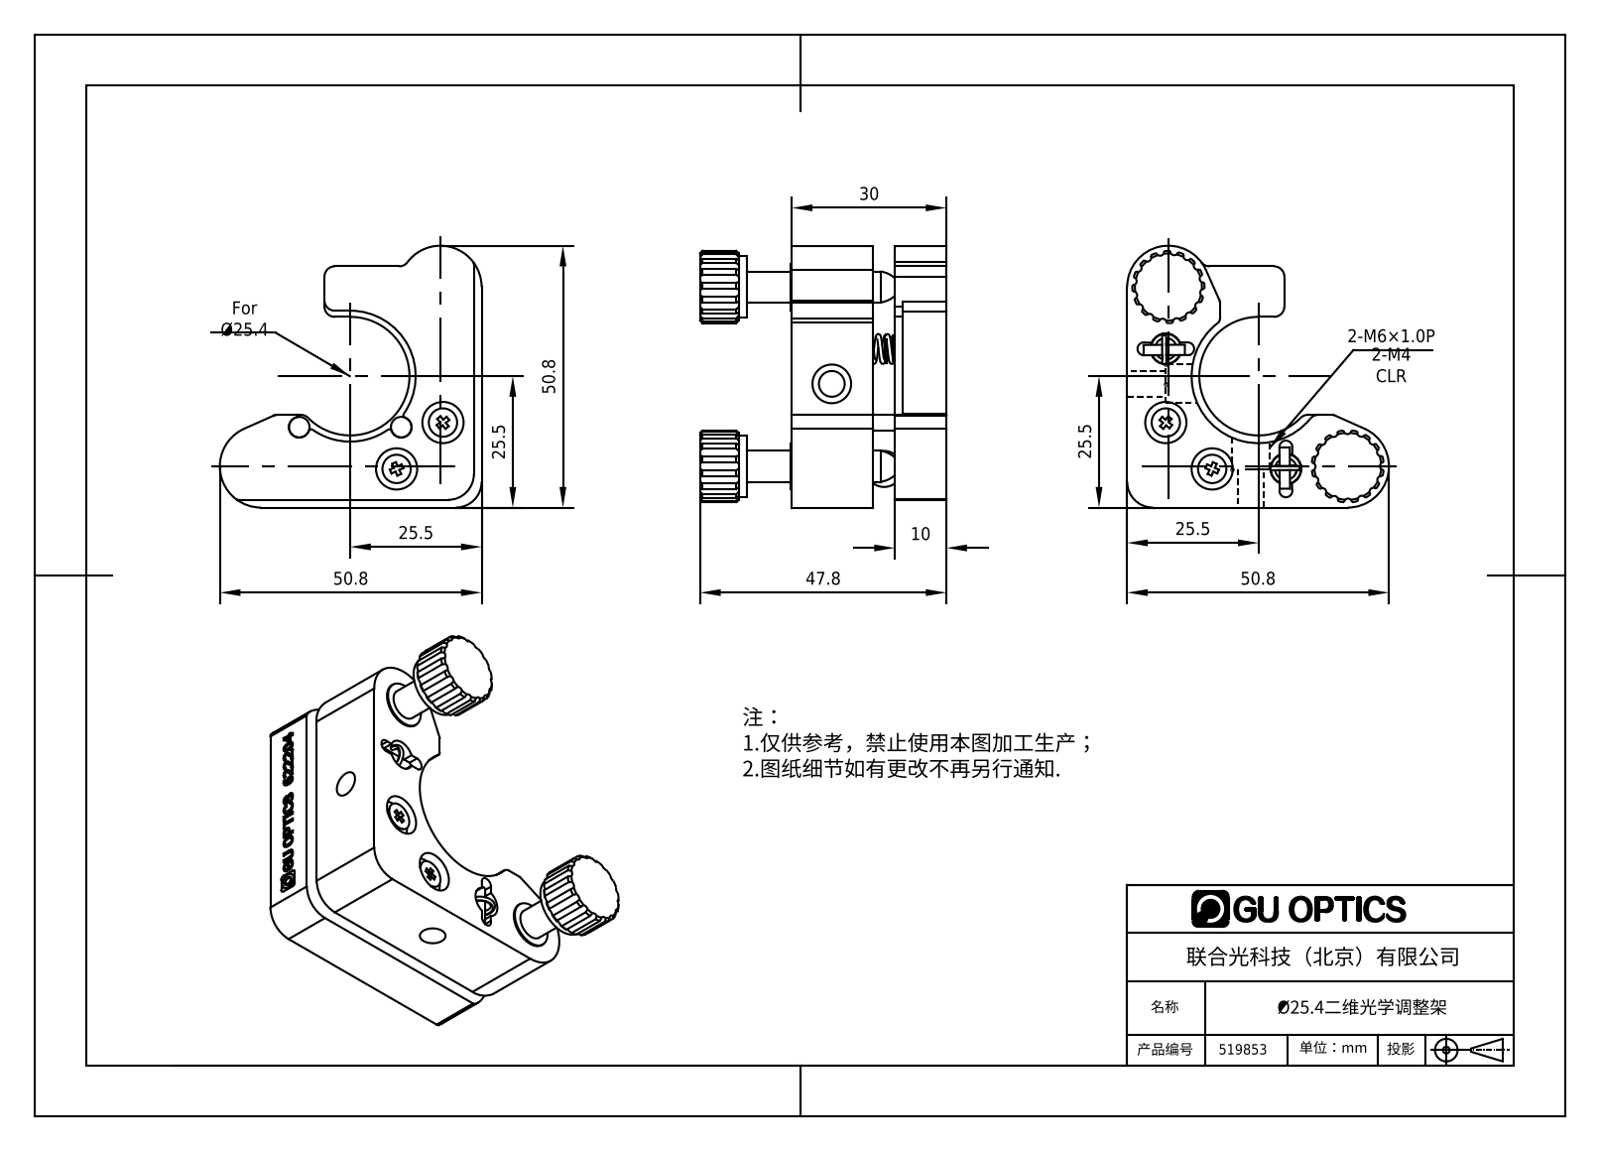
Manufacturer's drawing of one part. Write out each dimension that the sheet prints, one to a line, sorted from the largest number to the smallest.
50.8
50.8
50.8
47.8
30
25.5
25.5
25.5
25.5
10
